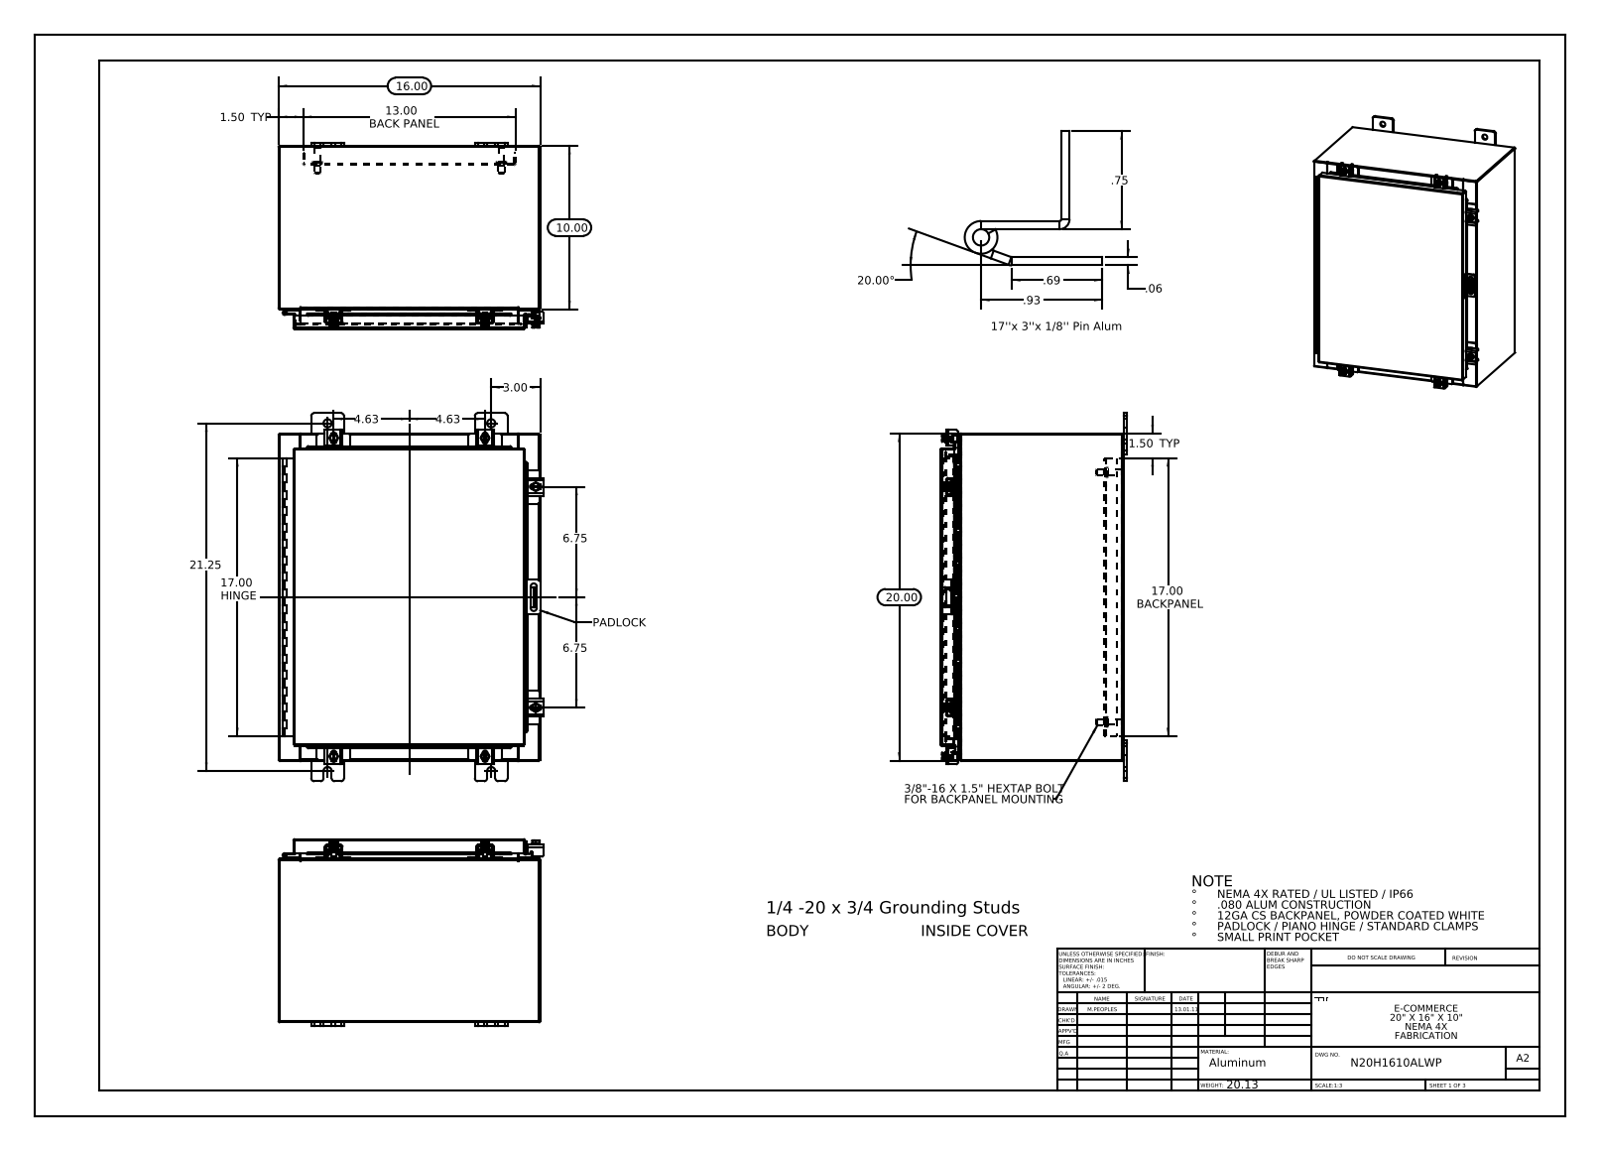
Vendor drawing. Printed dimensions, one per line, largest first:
21.25
20.00
20.00°
17.00 HINGE
17.00 BACKPANEL
16.00
13.00 BACK PANEL
10.00
6.75
6.75
4.63
4.63
3.00
1.50 TYP
1.50 TYP
.93
.75
.69
.06
